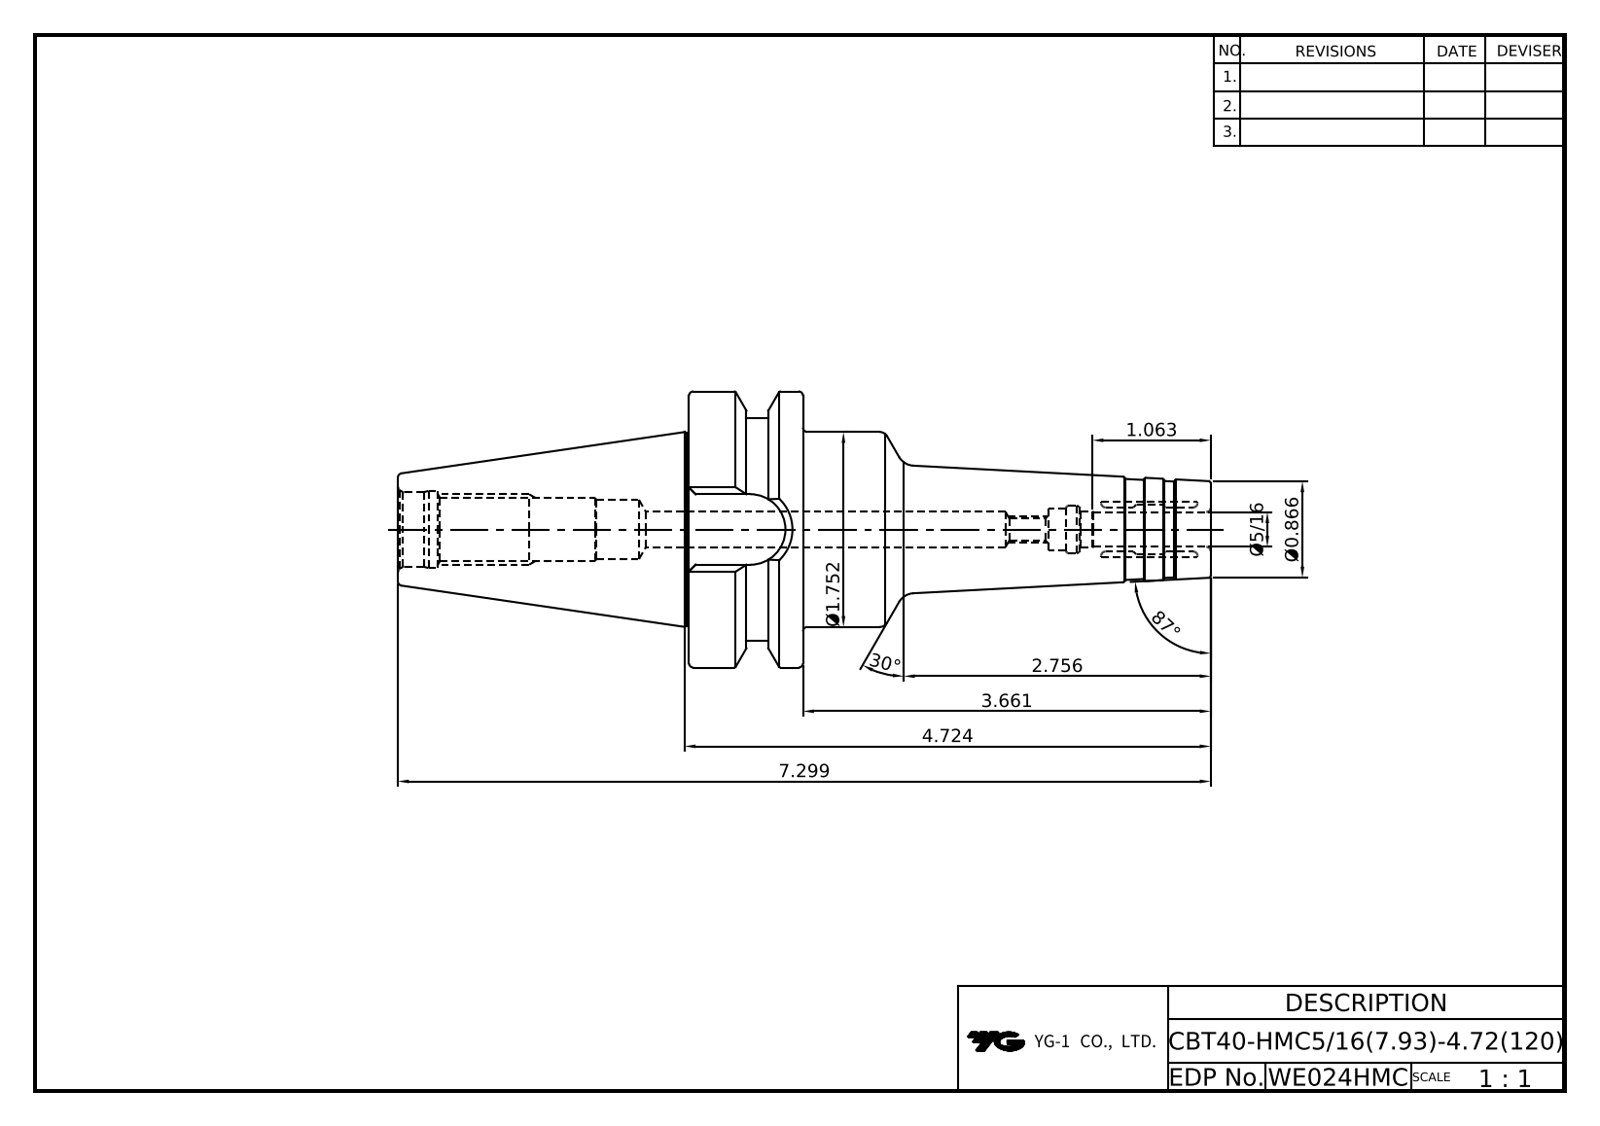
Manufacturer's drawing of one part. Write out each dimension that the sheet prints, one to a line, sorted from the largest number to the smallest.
87°
30°
7.299
4.724
3.661
2.756
Ø1.752
1.063
Ø0.866
Ø5/16
